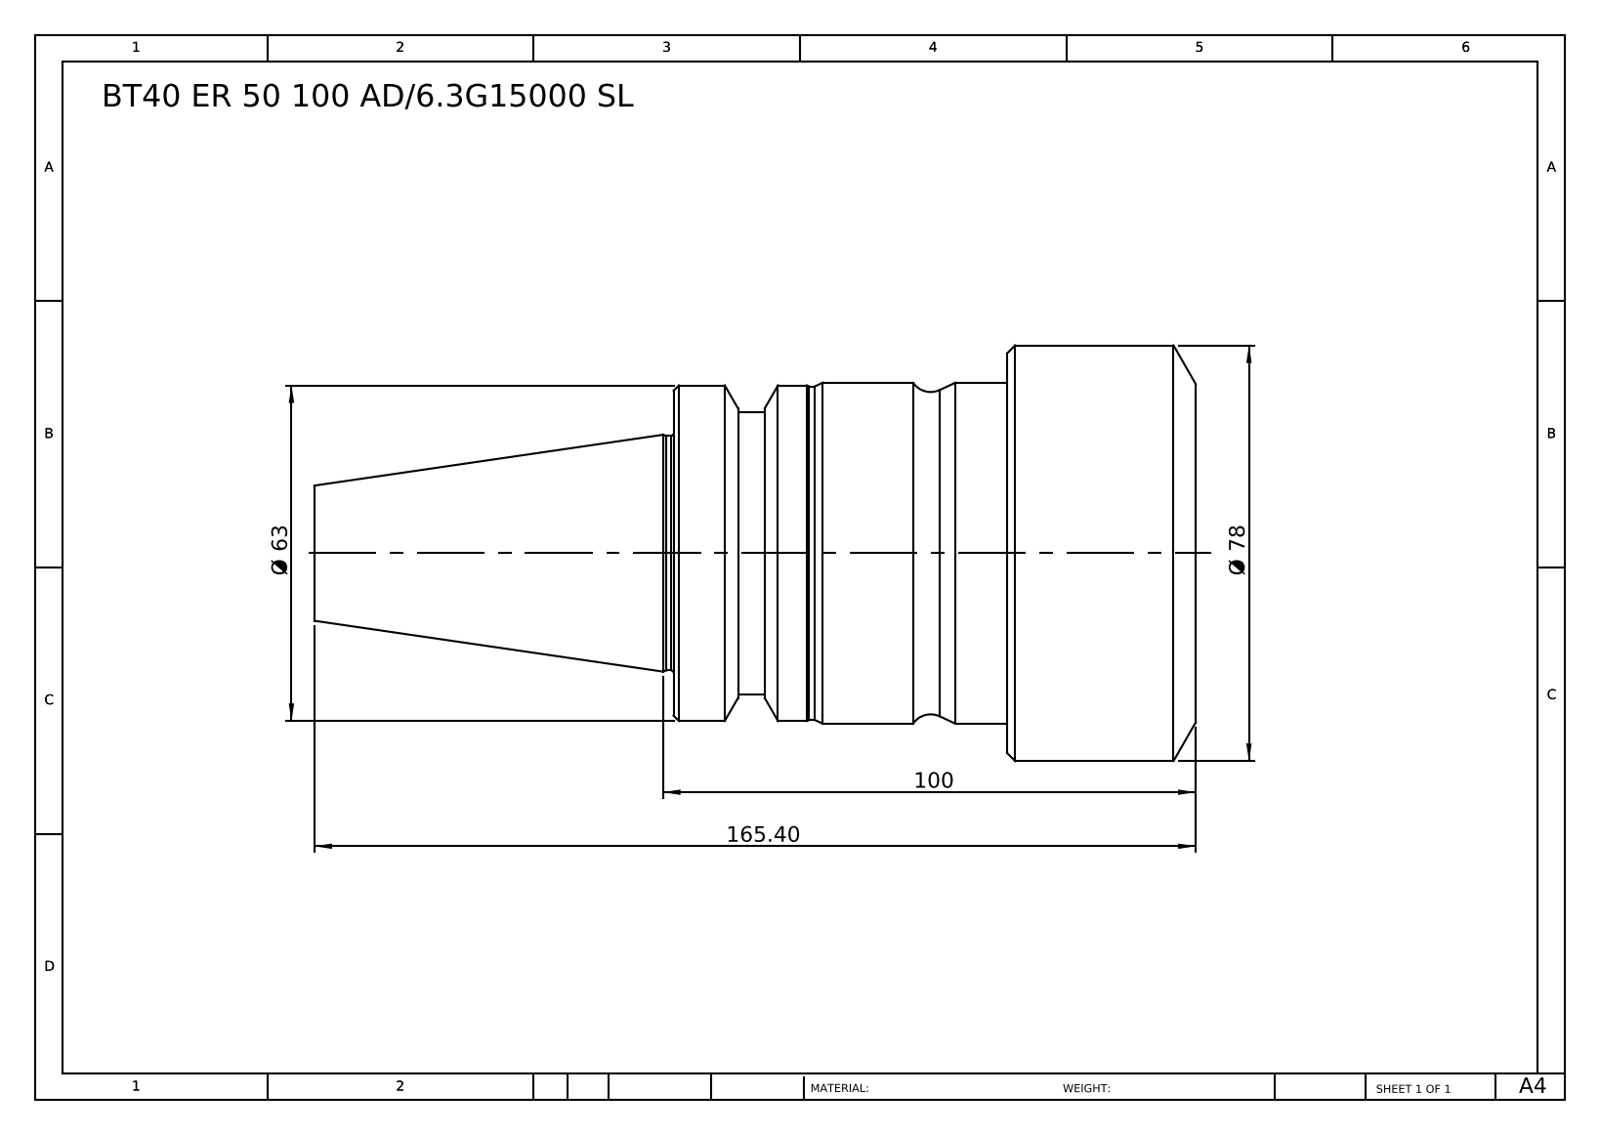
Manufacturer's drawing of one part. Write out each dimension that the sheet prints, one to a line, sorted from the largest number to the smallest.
165.40
100
Ø 78
Ø 63
